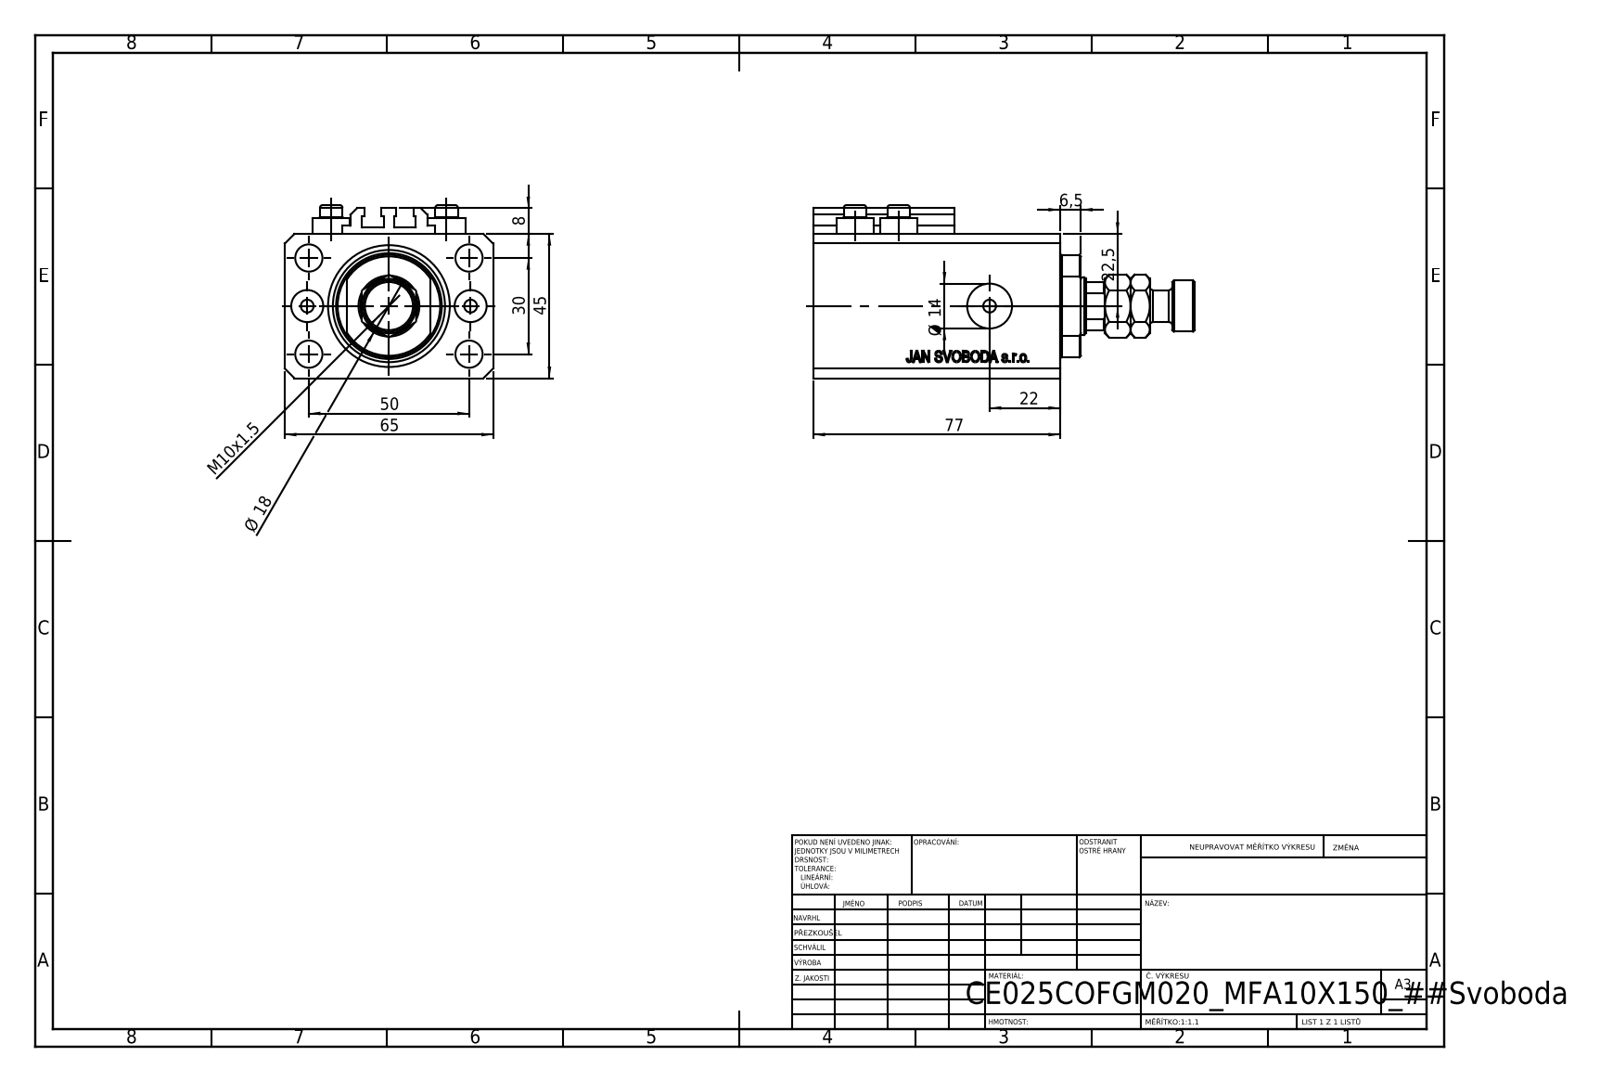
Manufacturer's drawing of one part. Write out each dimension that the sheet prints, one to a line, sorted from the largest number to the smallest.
77
65
50
45
30
22,5
22
Ø 18
Ø 14
M10x1.5
8
6,5
